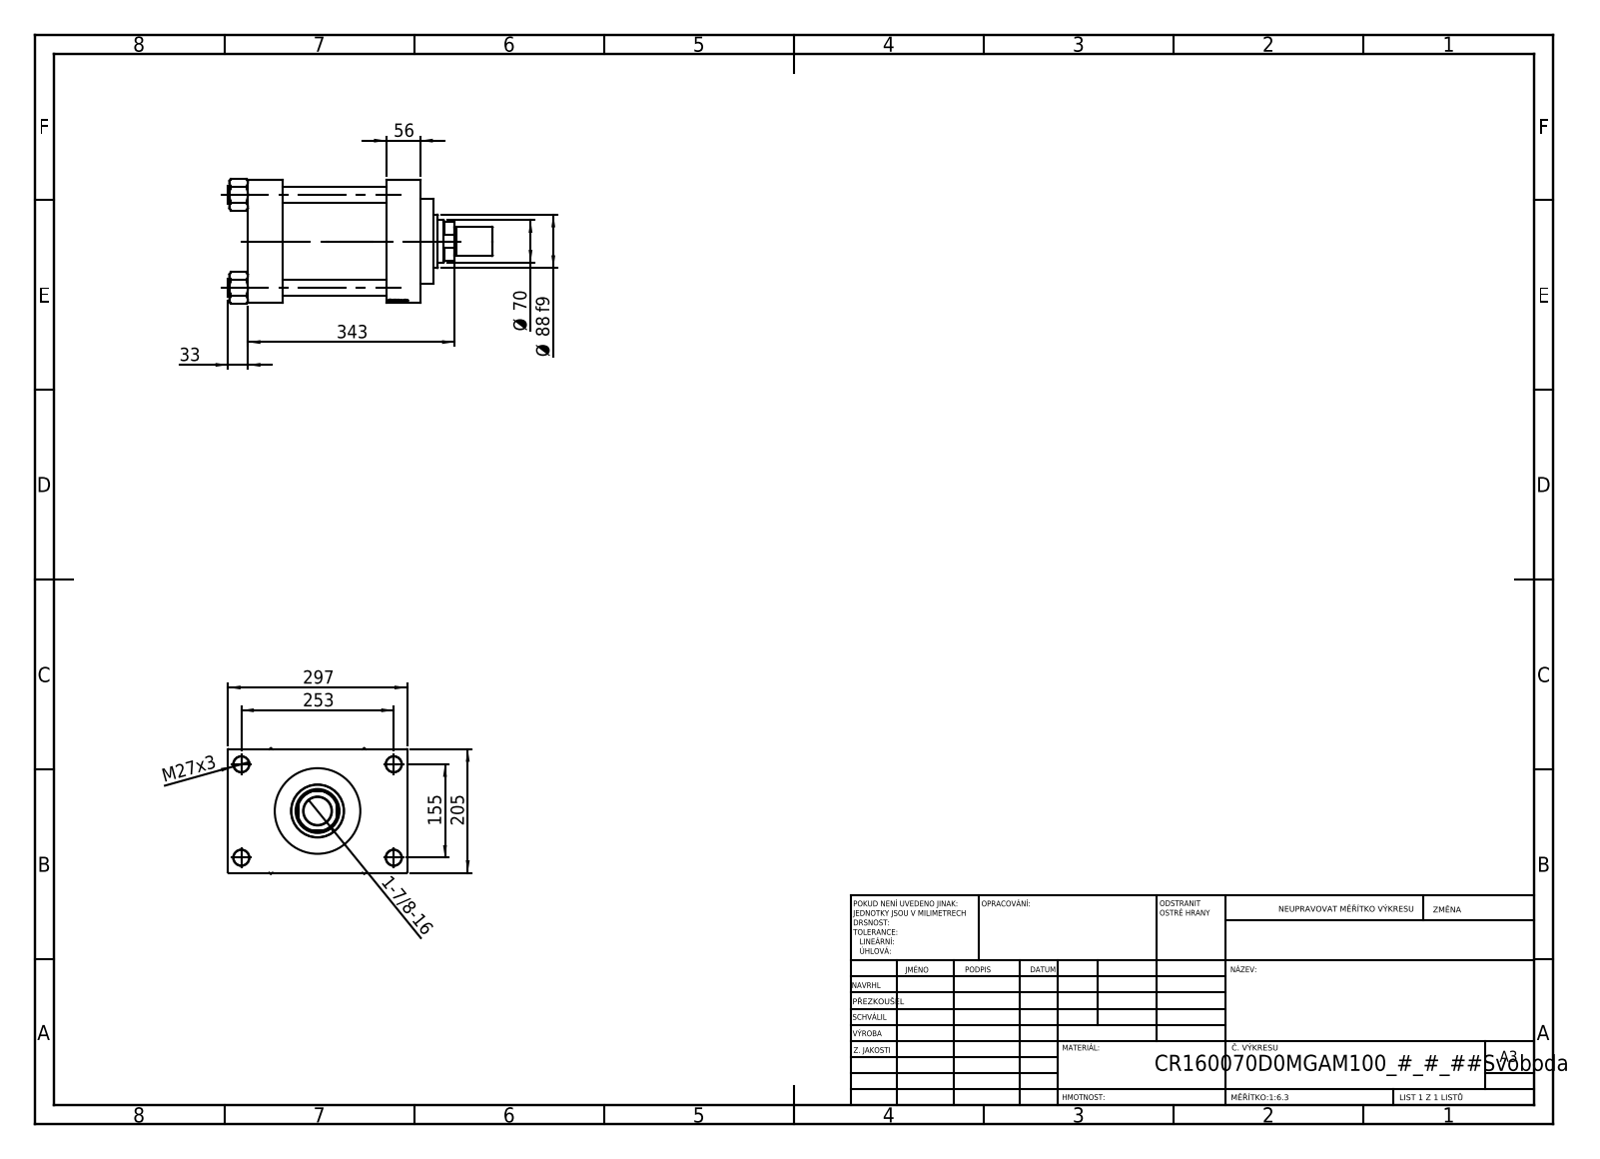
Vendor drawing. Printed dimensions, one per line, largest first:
343
297
253
205
155
Ø 88 f9
Ø 70
56
33
M27x3
1-7/8-16
